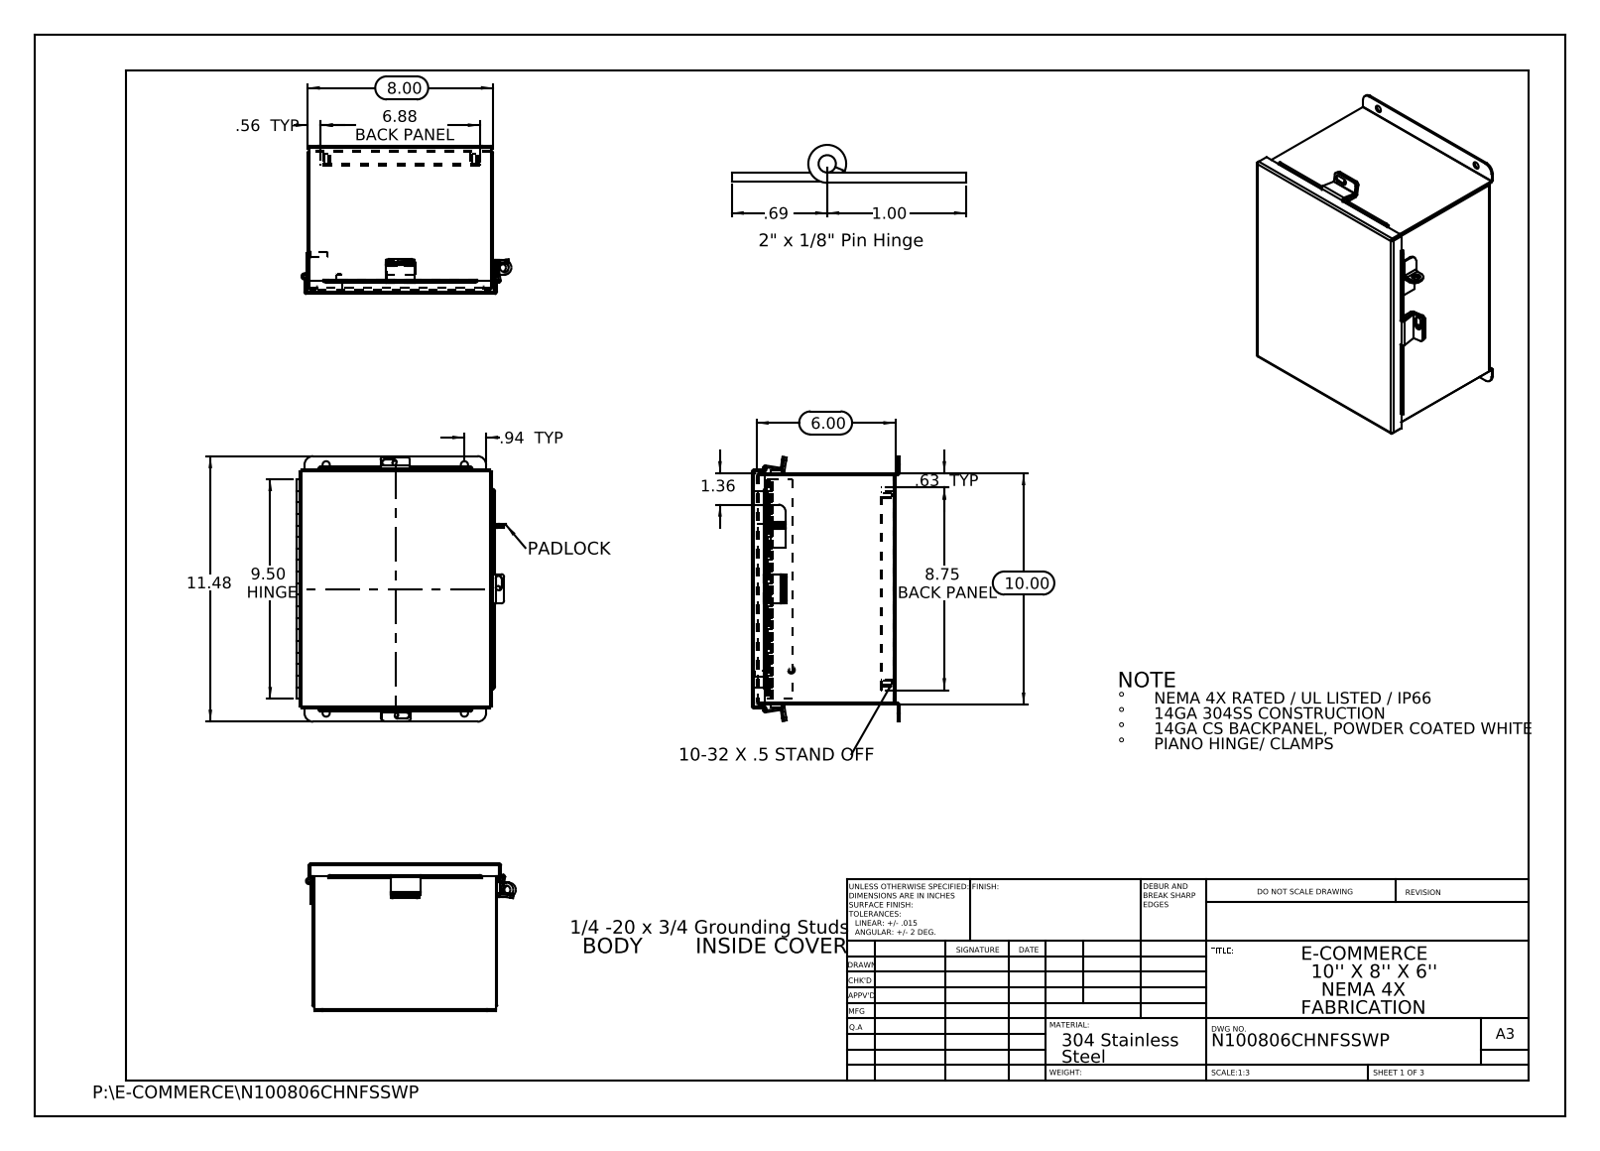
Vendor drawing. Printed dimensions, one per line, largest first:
11.48
10.00
9.50 HINGE
8.75 BACK PANEL
8.00
6.88 BACK PANEL
6.00
1.36
1.00
.94 TYP
.69
.63 TYP
.56 TYP
